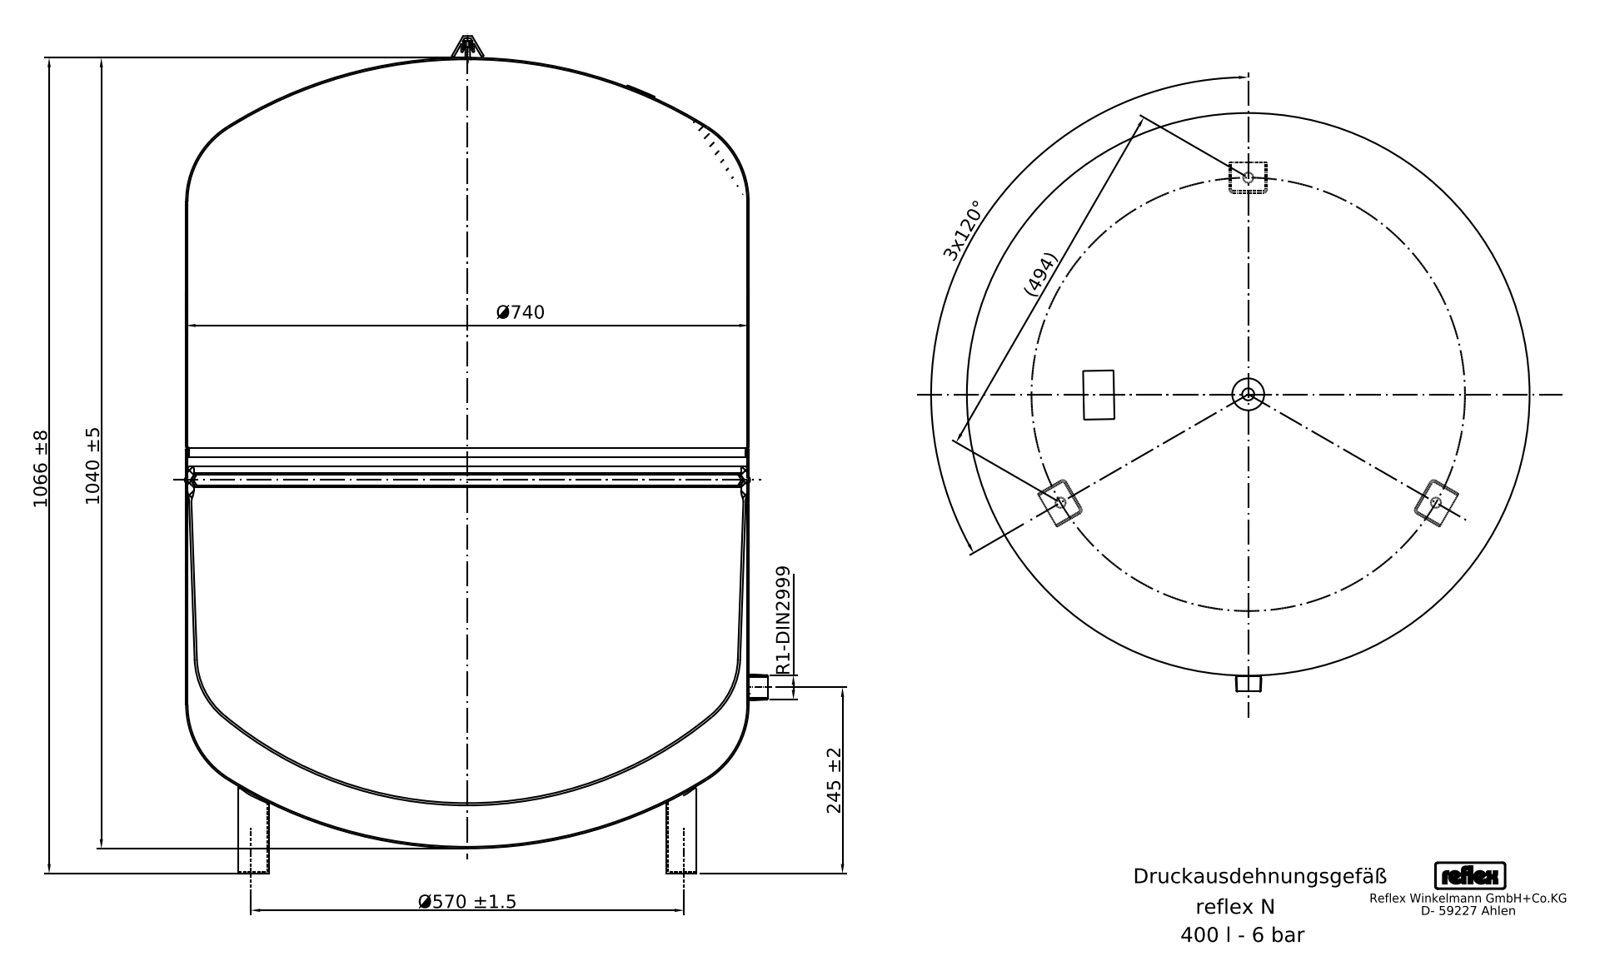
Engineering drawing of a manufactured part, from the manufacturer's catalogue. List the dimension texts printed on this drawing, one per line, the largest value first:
1066 ±8
1040 ±5
Ø740
Ø570 ±1.5
(494)
245 ±2
3x120°
R1-DIN2999
